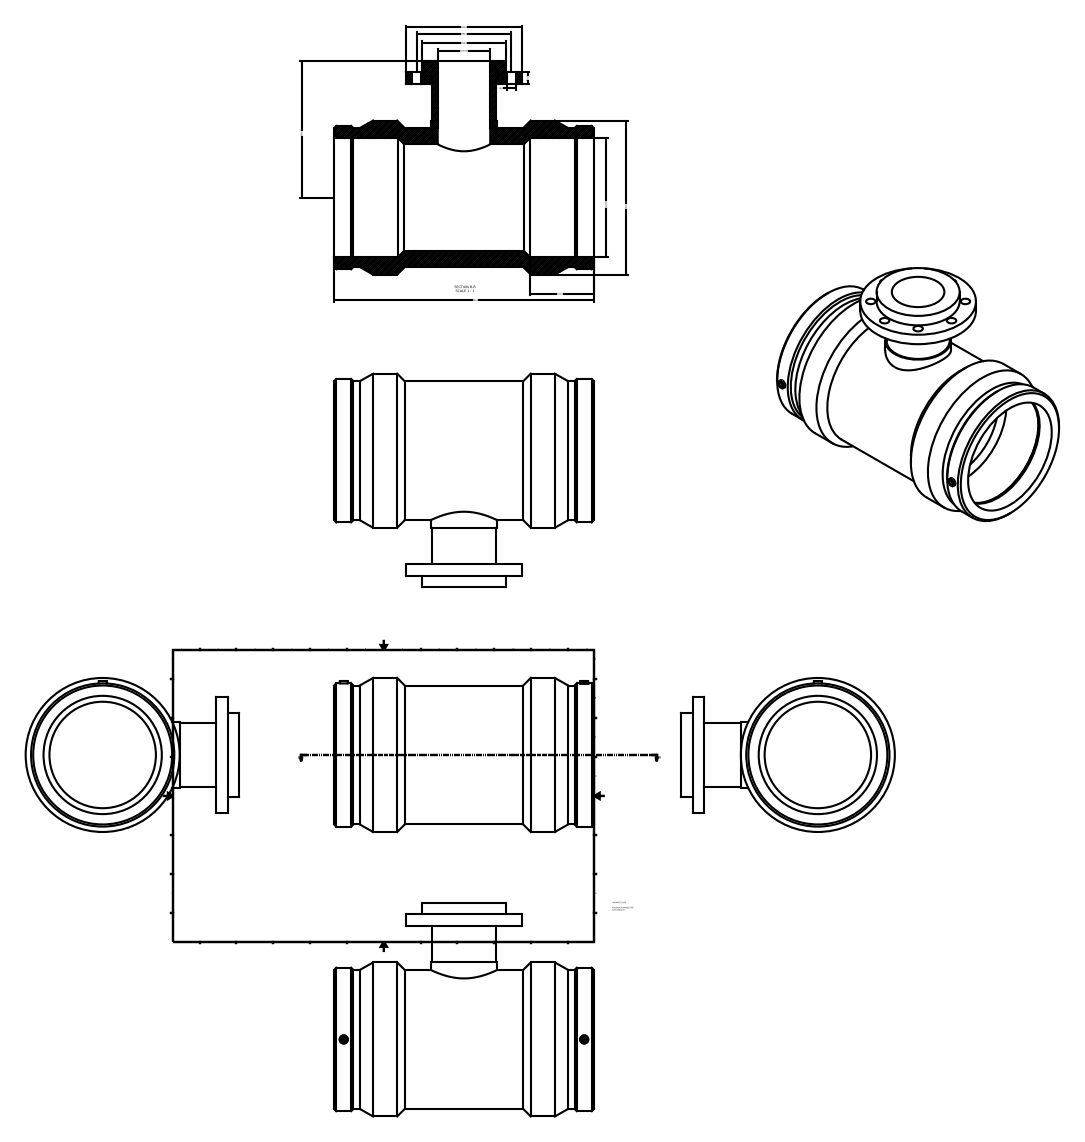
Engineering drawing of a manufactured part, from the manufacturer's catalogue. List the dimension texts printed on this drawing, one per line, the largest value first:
494.00
293.00
260.00
n225.00
220.00
180.00
158.00
122.00
n100.00
22.00
18.00
